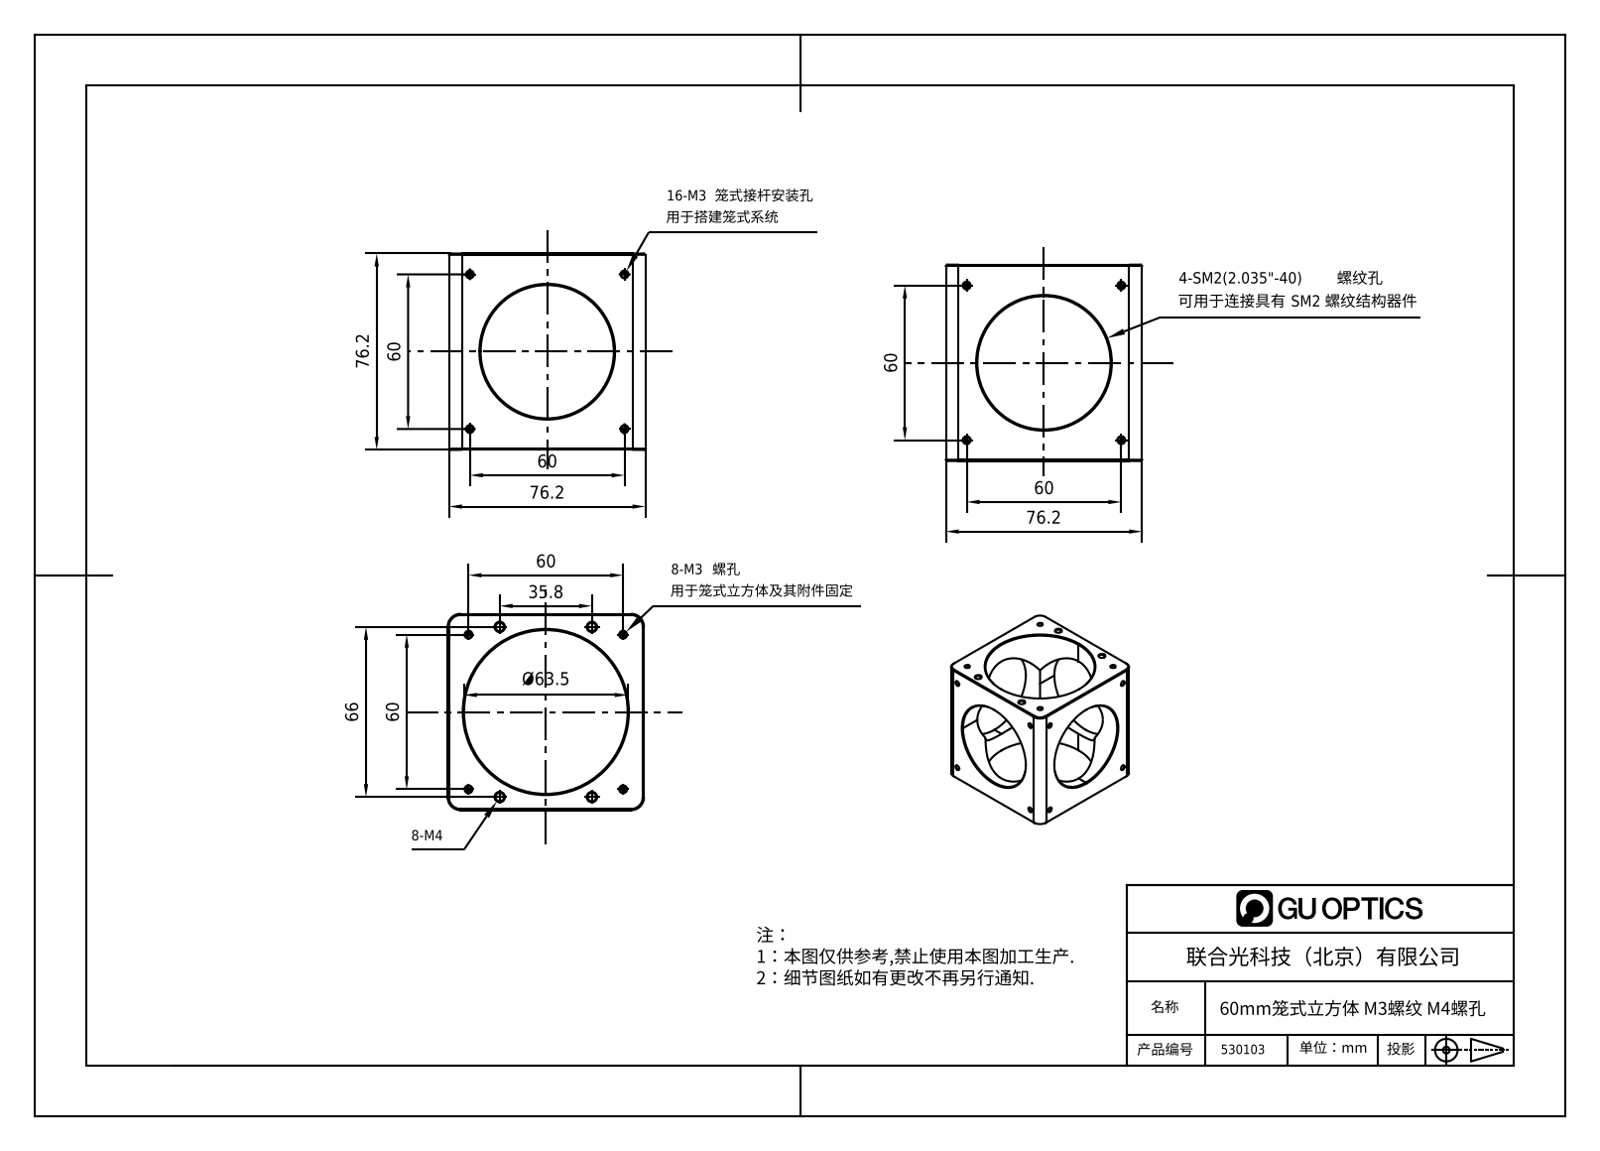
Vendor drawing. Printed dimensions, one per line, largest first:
76.2
76.2
76.2
66
Ø63.5
60
60
60
60
60
60
35.8
